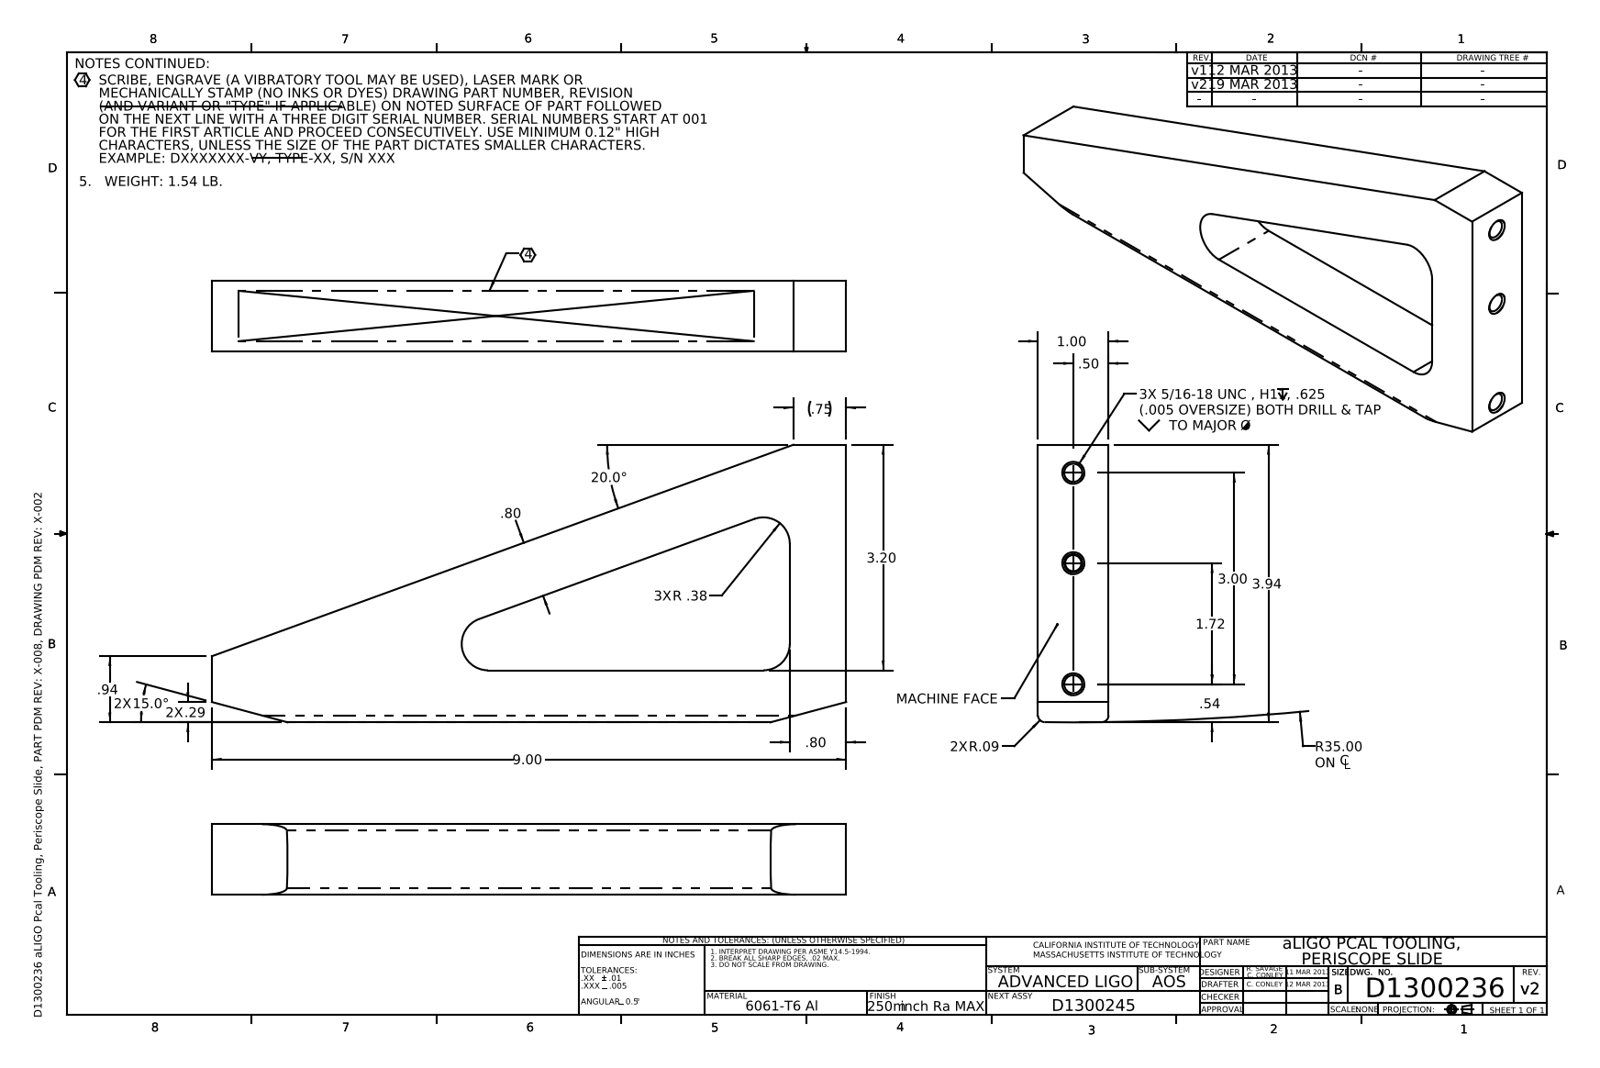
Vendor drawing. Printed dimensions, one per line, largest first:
R35.00 ON
20.0°
2X 15.0°
9.00
3.94
3.20
3.00
1.72
1.00
.94
.80
.80
.75
.54
.50
3X R .38
3X 5/16-18 UNC , H11, .625 (.005 OVERSIZE) BOTH DRILL & TAP TO MAJOR Ø
2X .29
2X R.09
